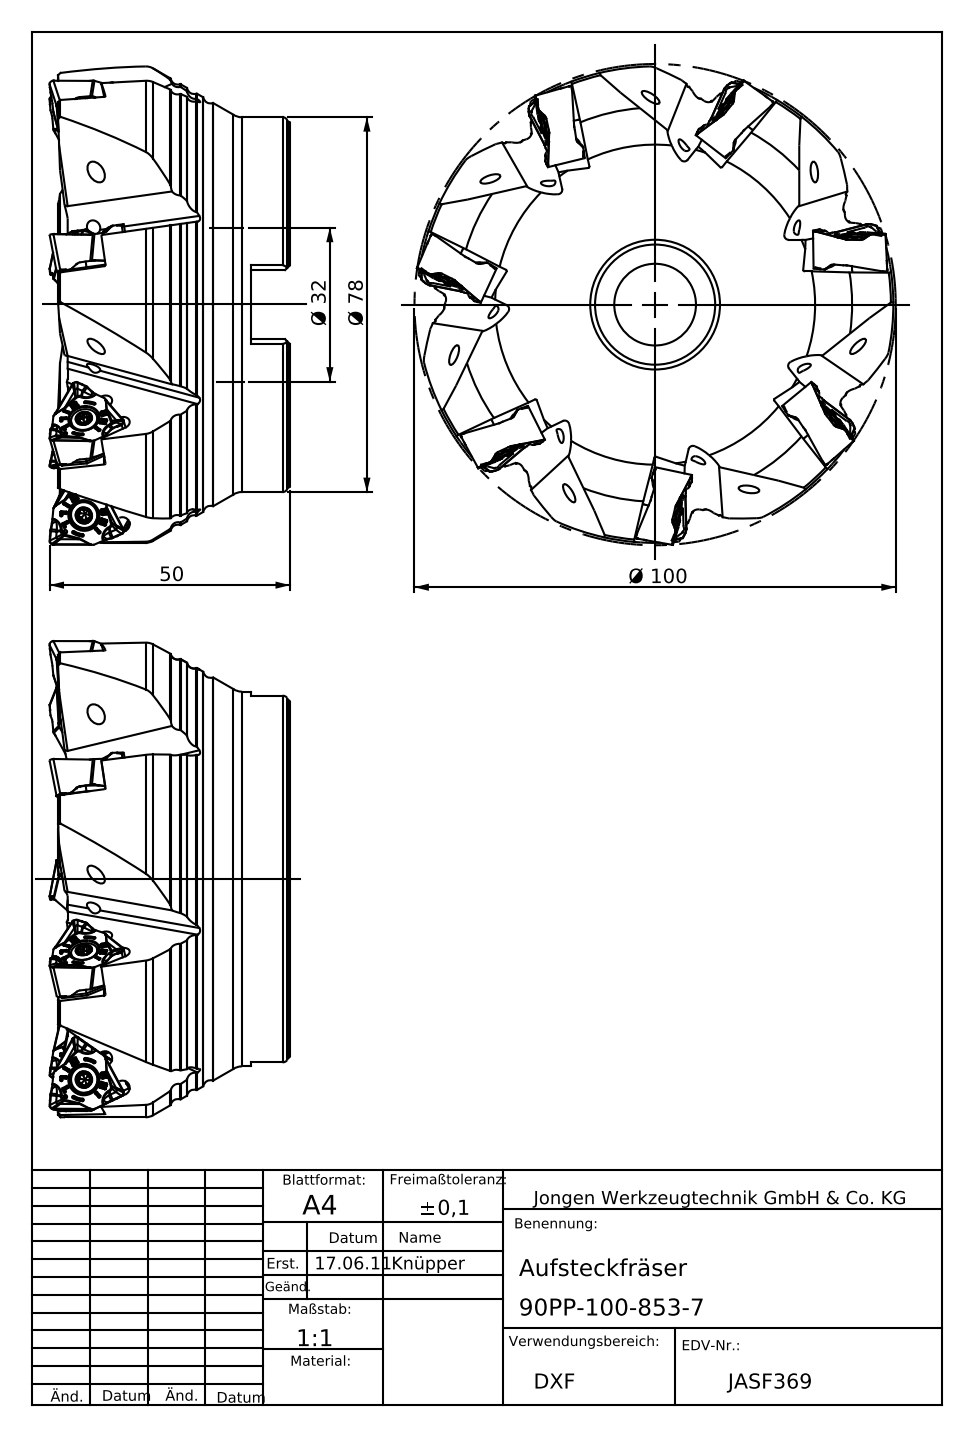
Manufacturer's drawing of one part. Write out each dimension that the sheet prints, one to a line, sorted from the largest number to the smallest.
Ø 100
Ø 78
50
Ø 32
